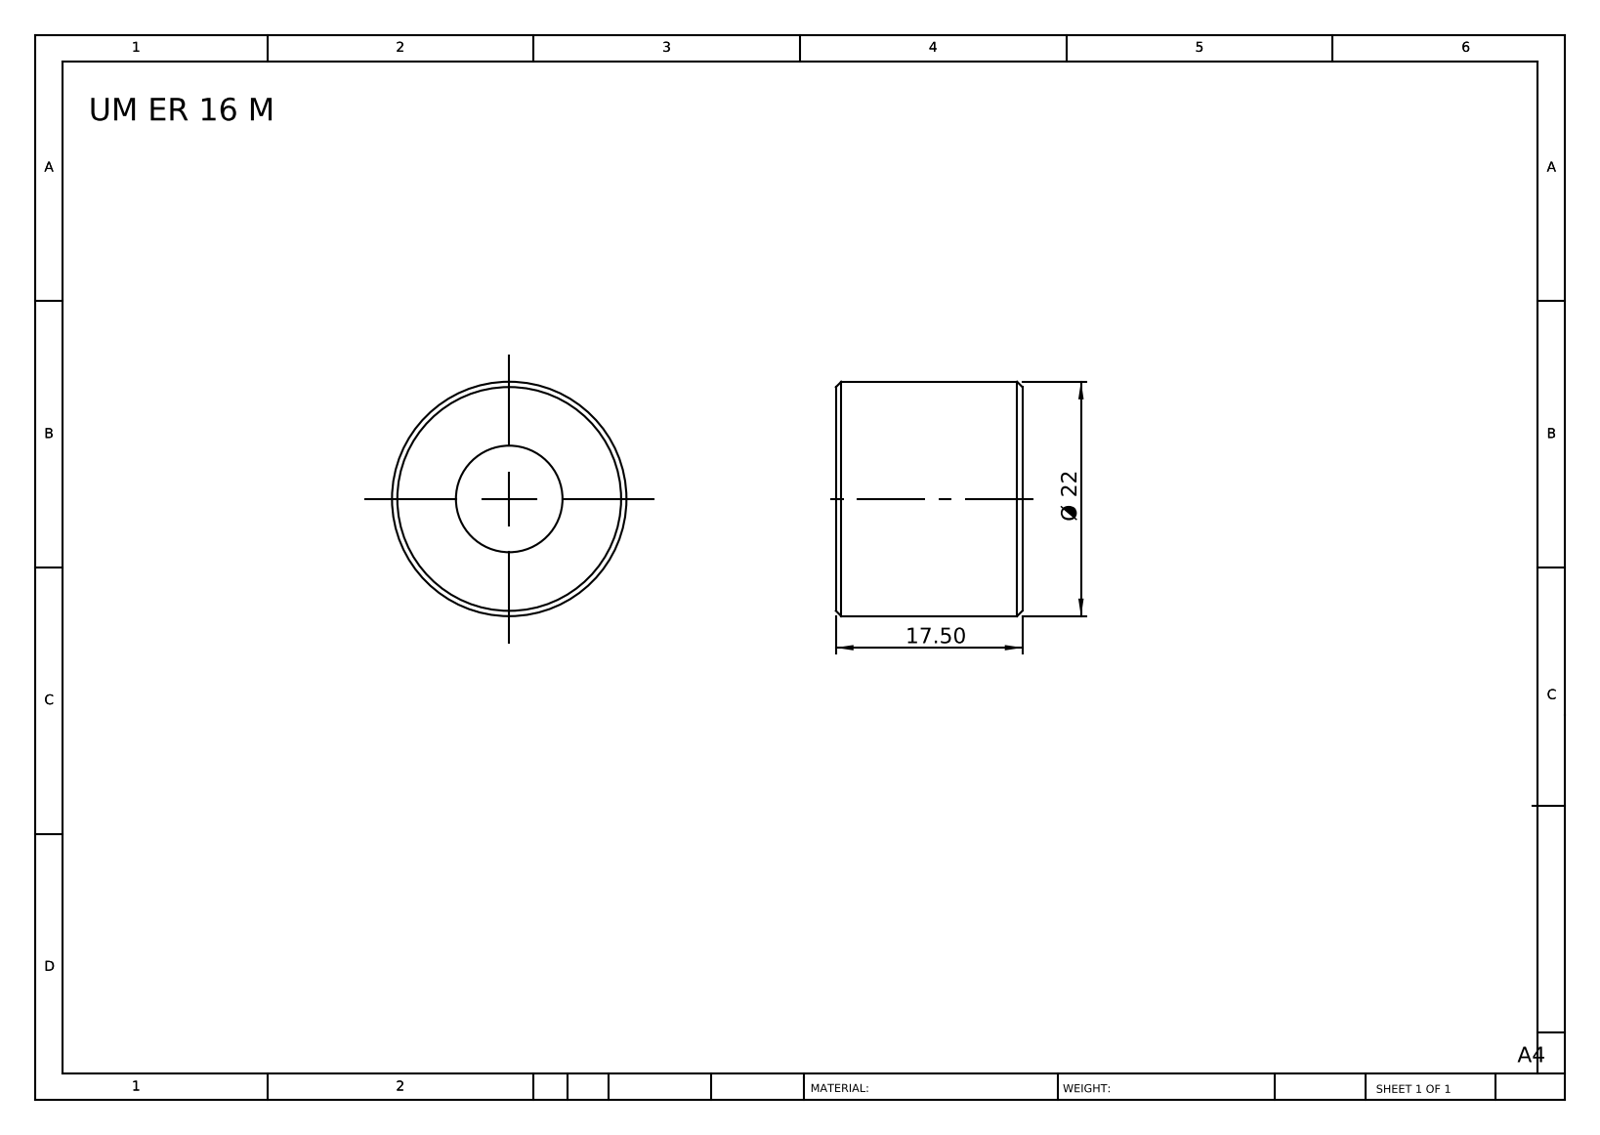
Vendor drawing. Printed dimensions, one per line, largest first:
Ø 22
17.50
